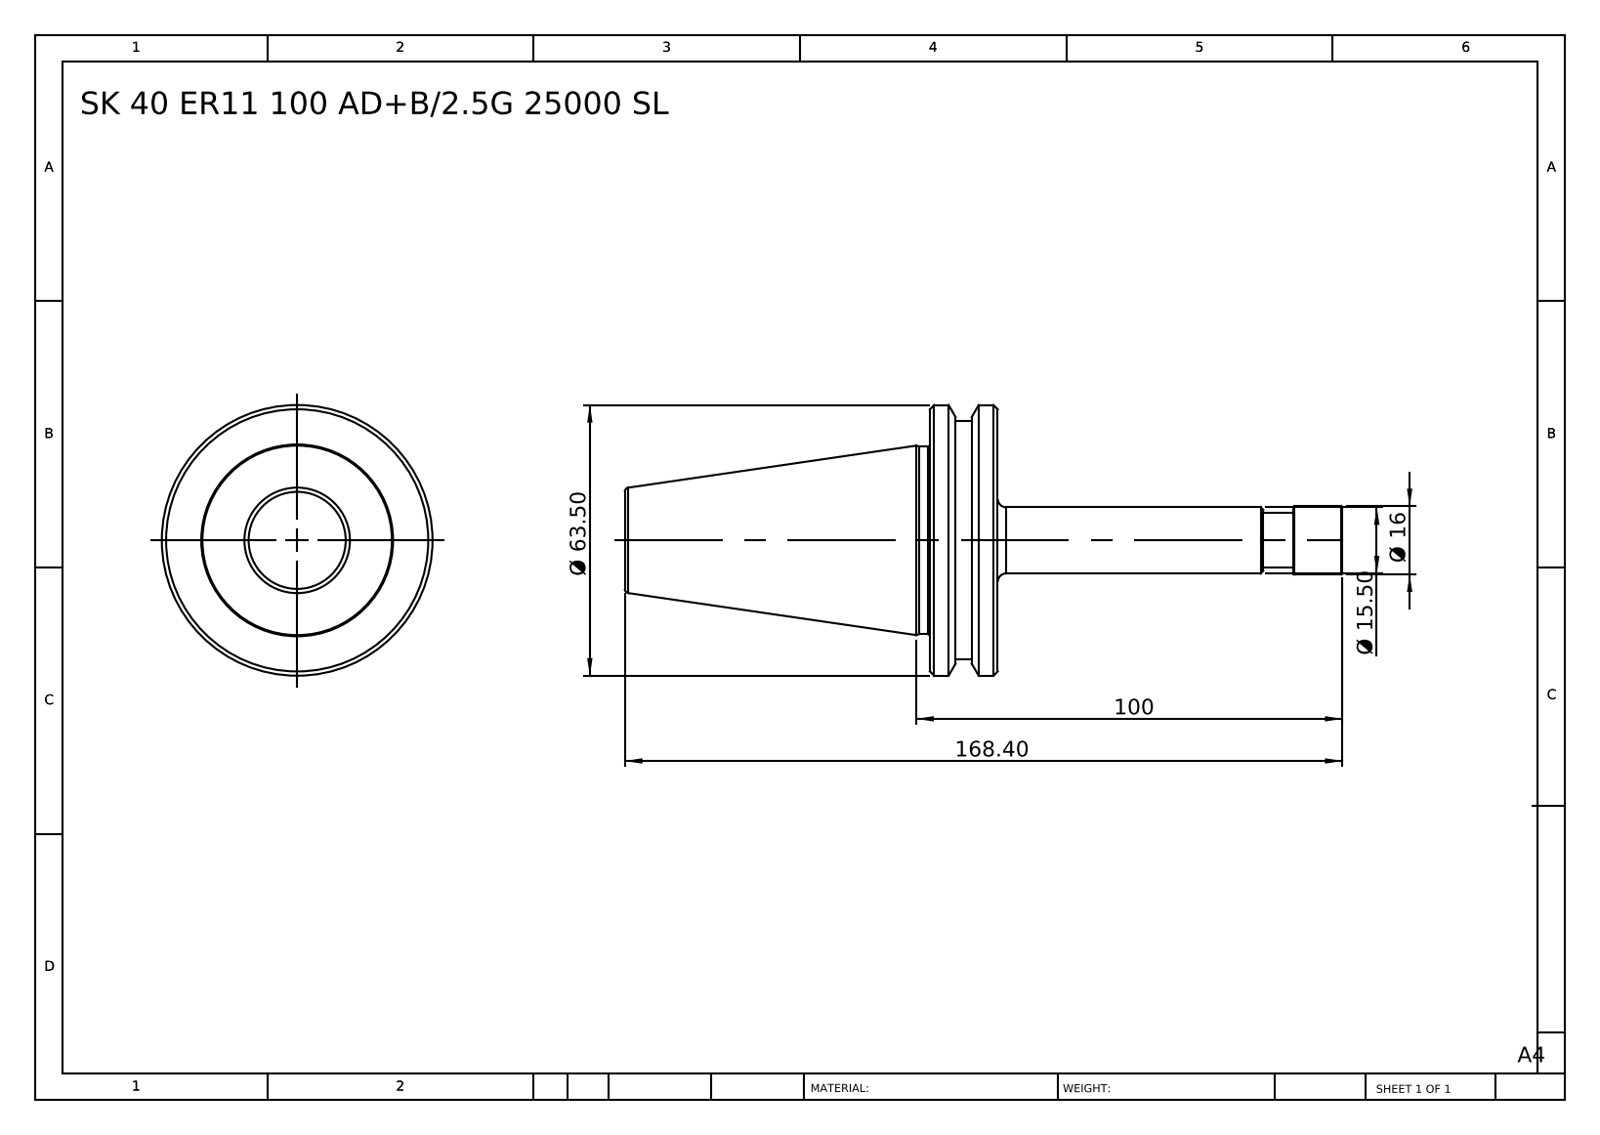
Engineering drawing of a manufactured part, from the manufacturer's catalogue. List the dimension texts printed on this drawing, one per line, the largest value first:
168.40
100
Ø 63.50
Ø 16
Ø 15.50
